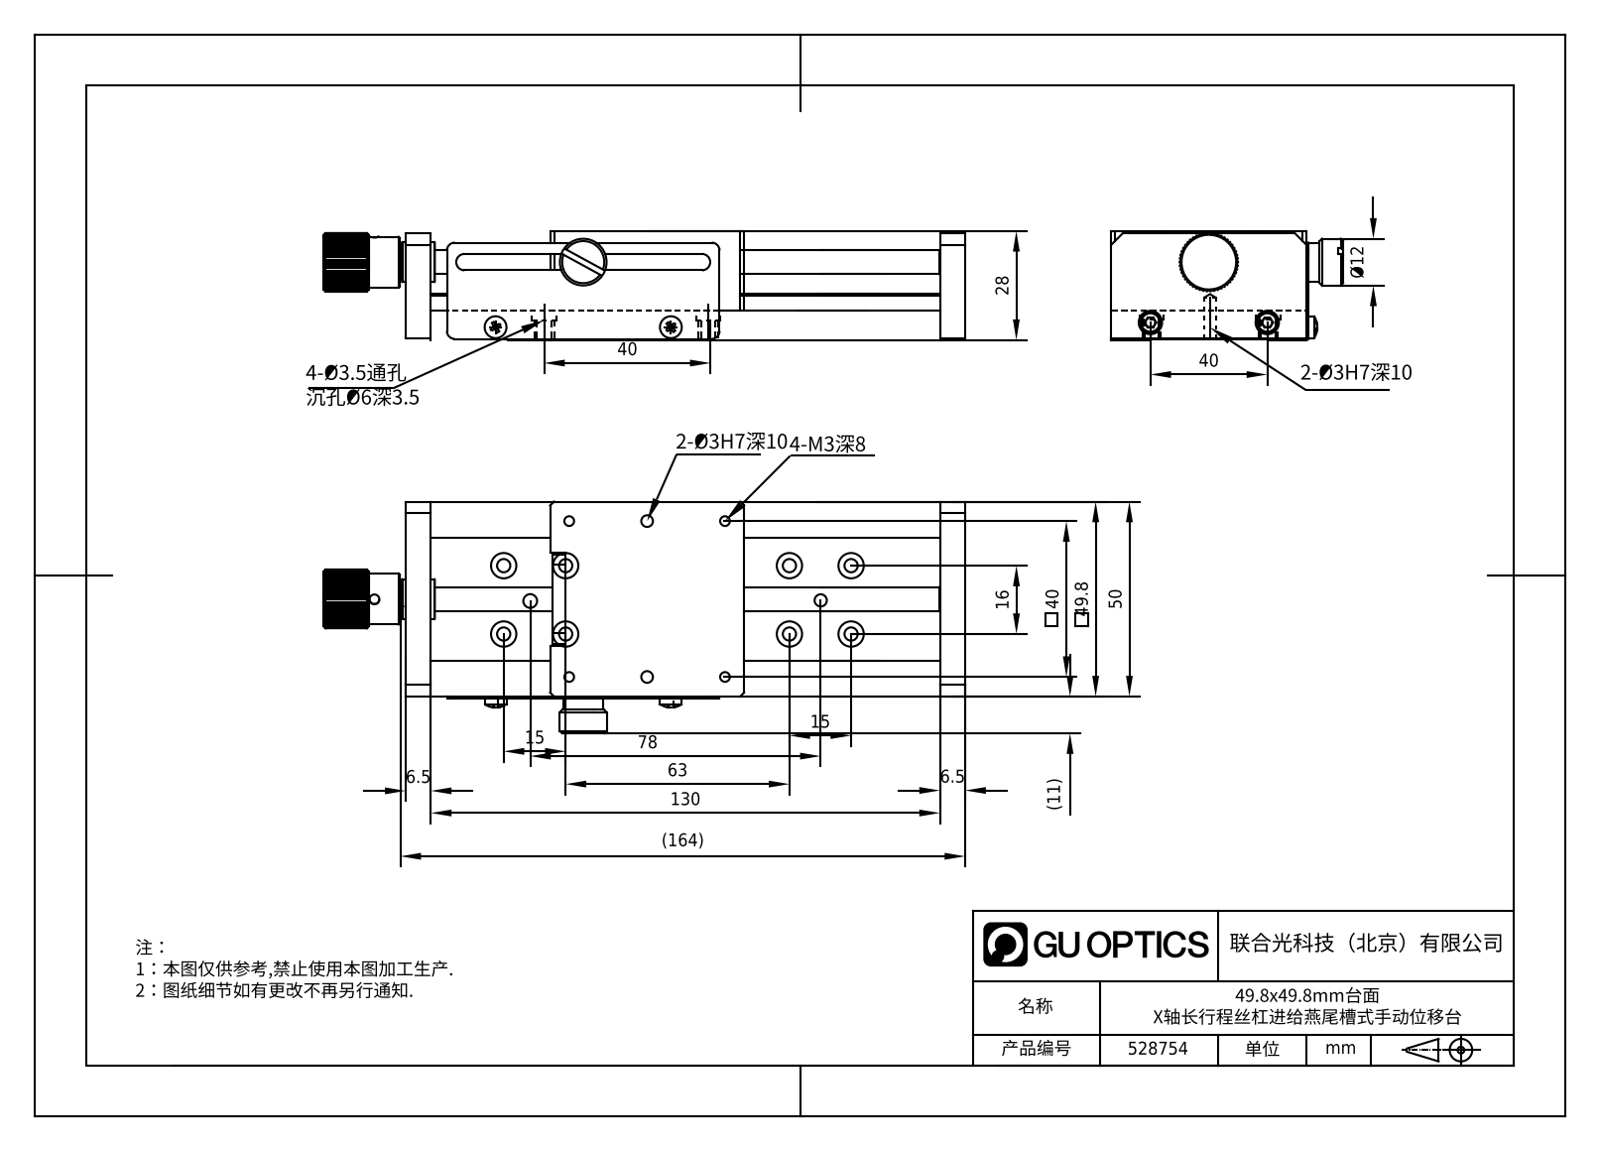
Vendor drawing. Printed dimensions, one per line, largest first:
(164)
130
78
63
50
49.8
40
40
40
28
16
15
15
Ø12
(11)
6.5
6.5
